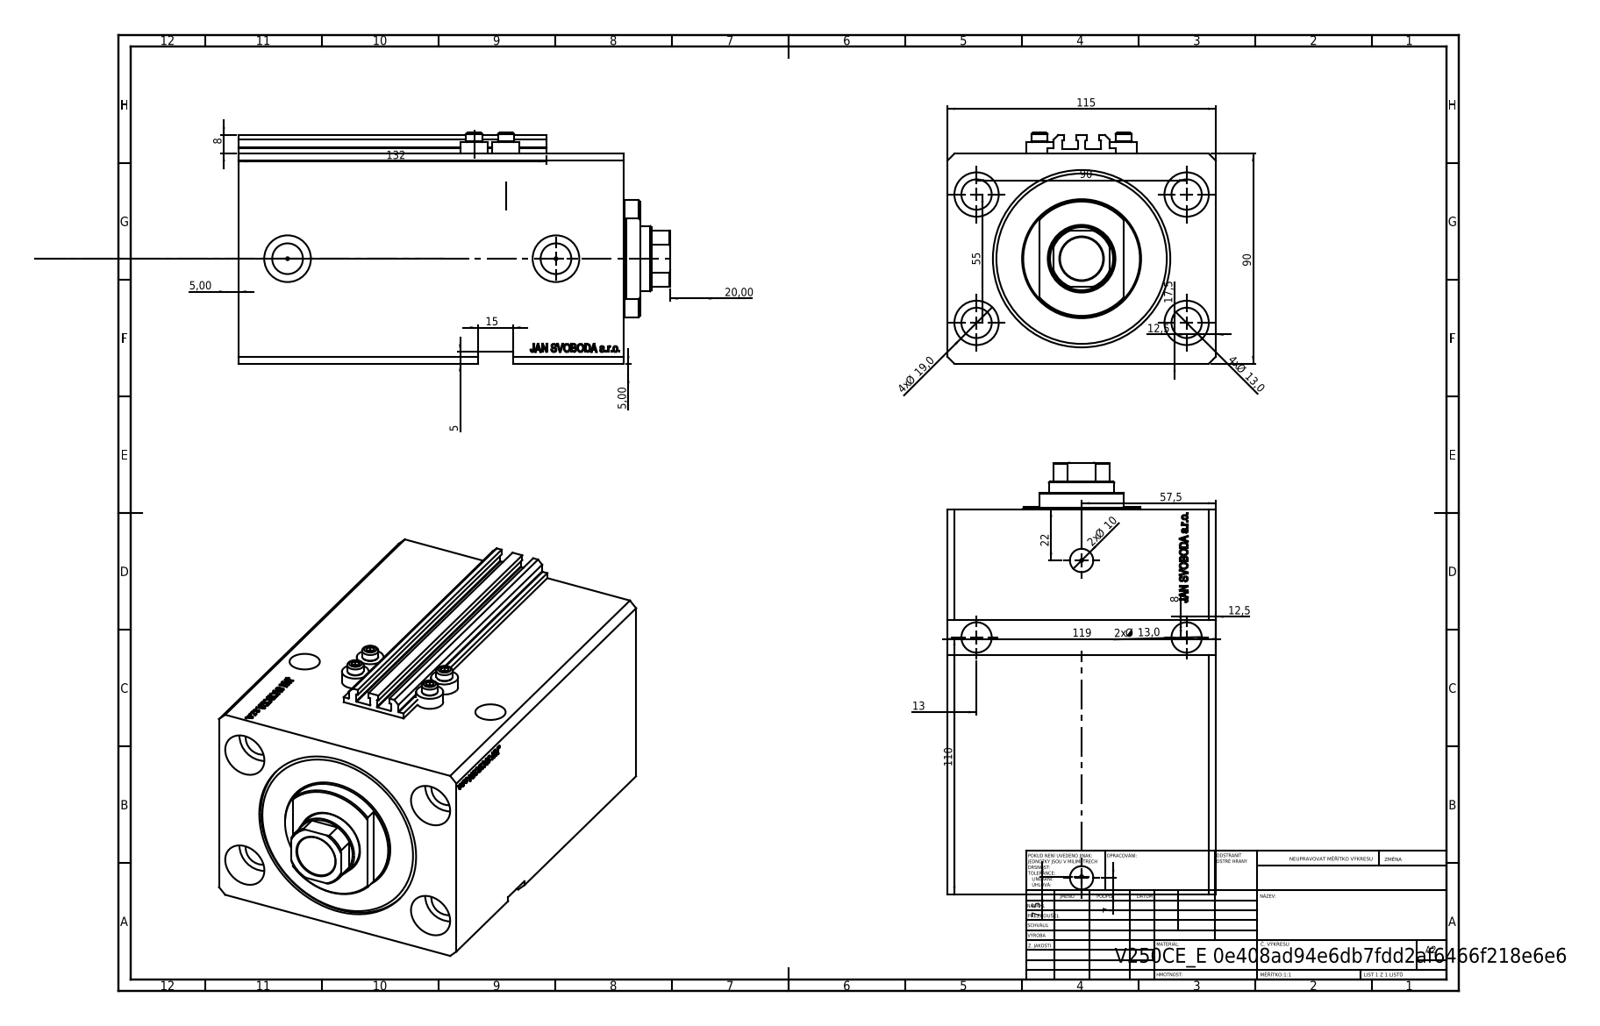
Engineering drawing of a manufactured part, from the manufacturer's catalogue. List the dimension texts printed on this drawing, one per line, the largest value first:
132
119
115
110
90
90
57,5
55
22
20,00
4x Ø 19,0
17,5
15
4x Ø 13,0
2x Ø 13,0
13
12,5
12,5
2x Ø 10
8
8
7,5
7
5,00
5,00
5
